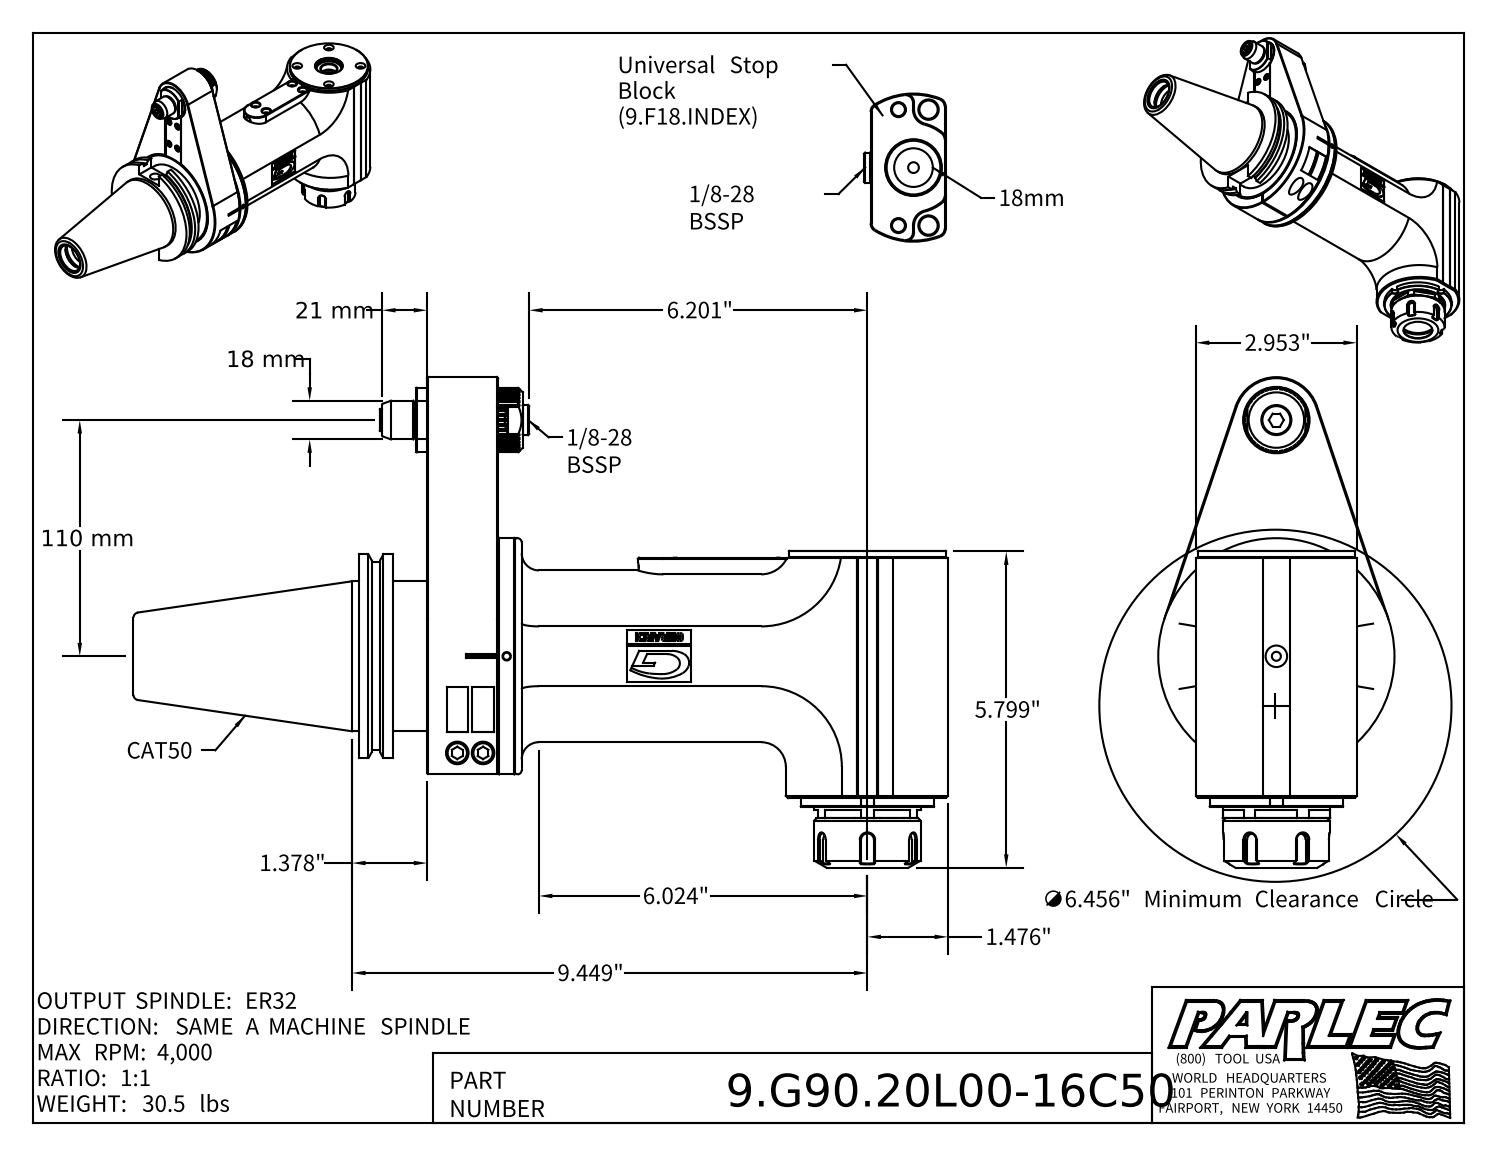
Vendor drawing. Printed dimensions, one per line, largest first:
110 mm
21 mm
18 mm
9.449"
∅6.456" Minimum Clearance Circle
6.201"
6.024"
5.799"
2.953"
1.476"
1.378"
